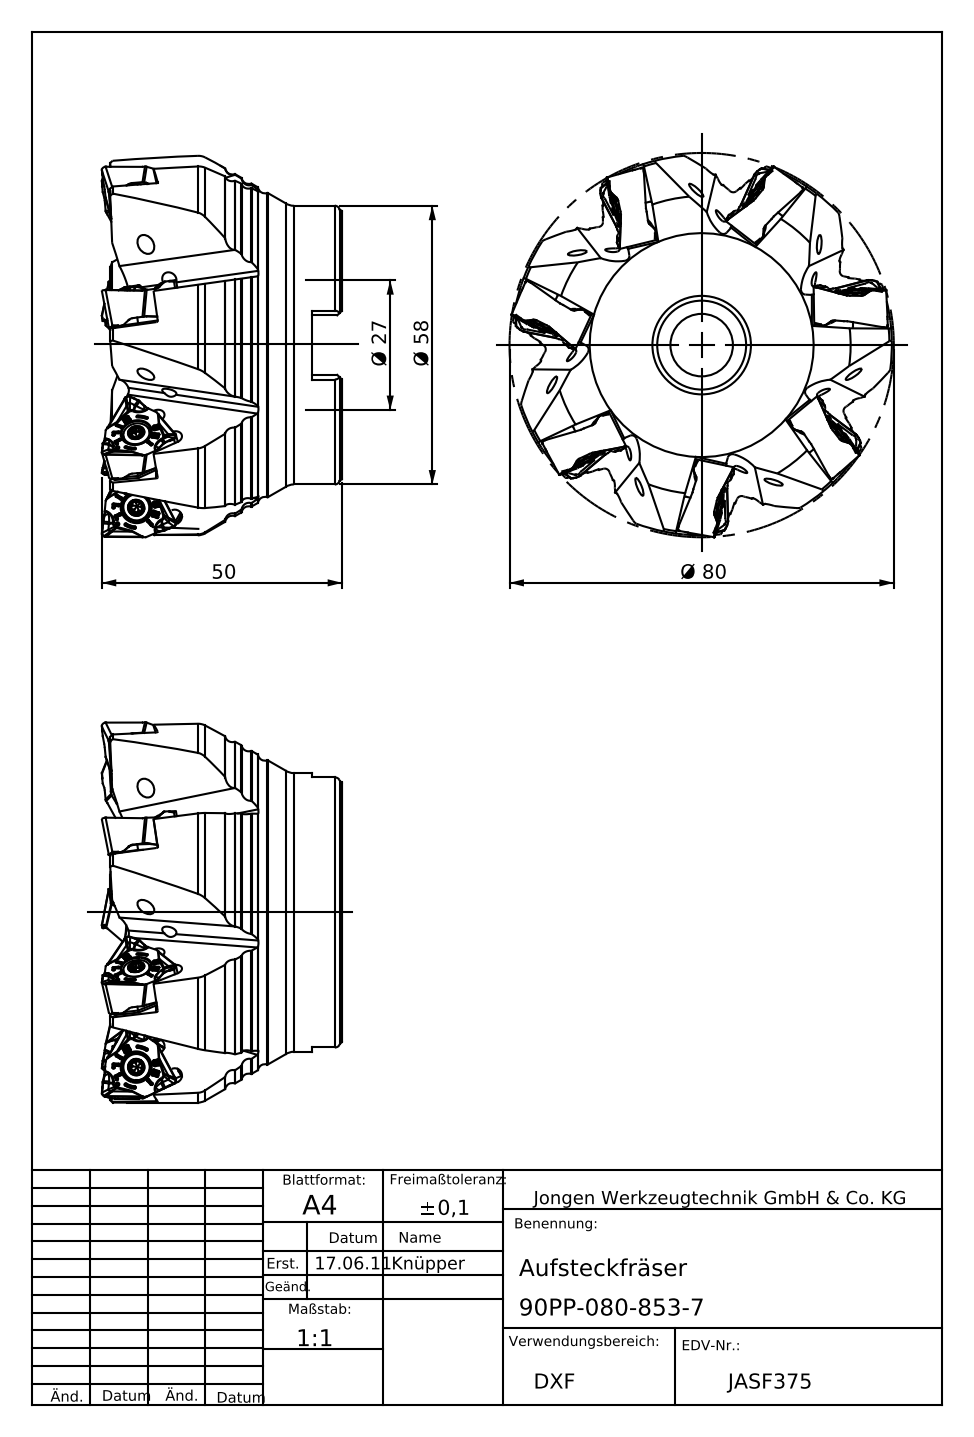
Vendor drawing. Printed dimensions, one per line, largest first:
Ø 80
Ø 58
50
Ø 27
